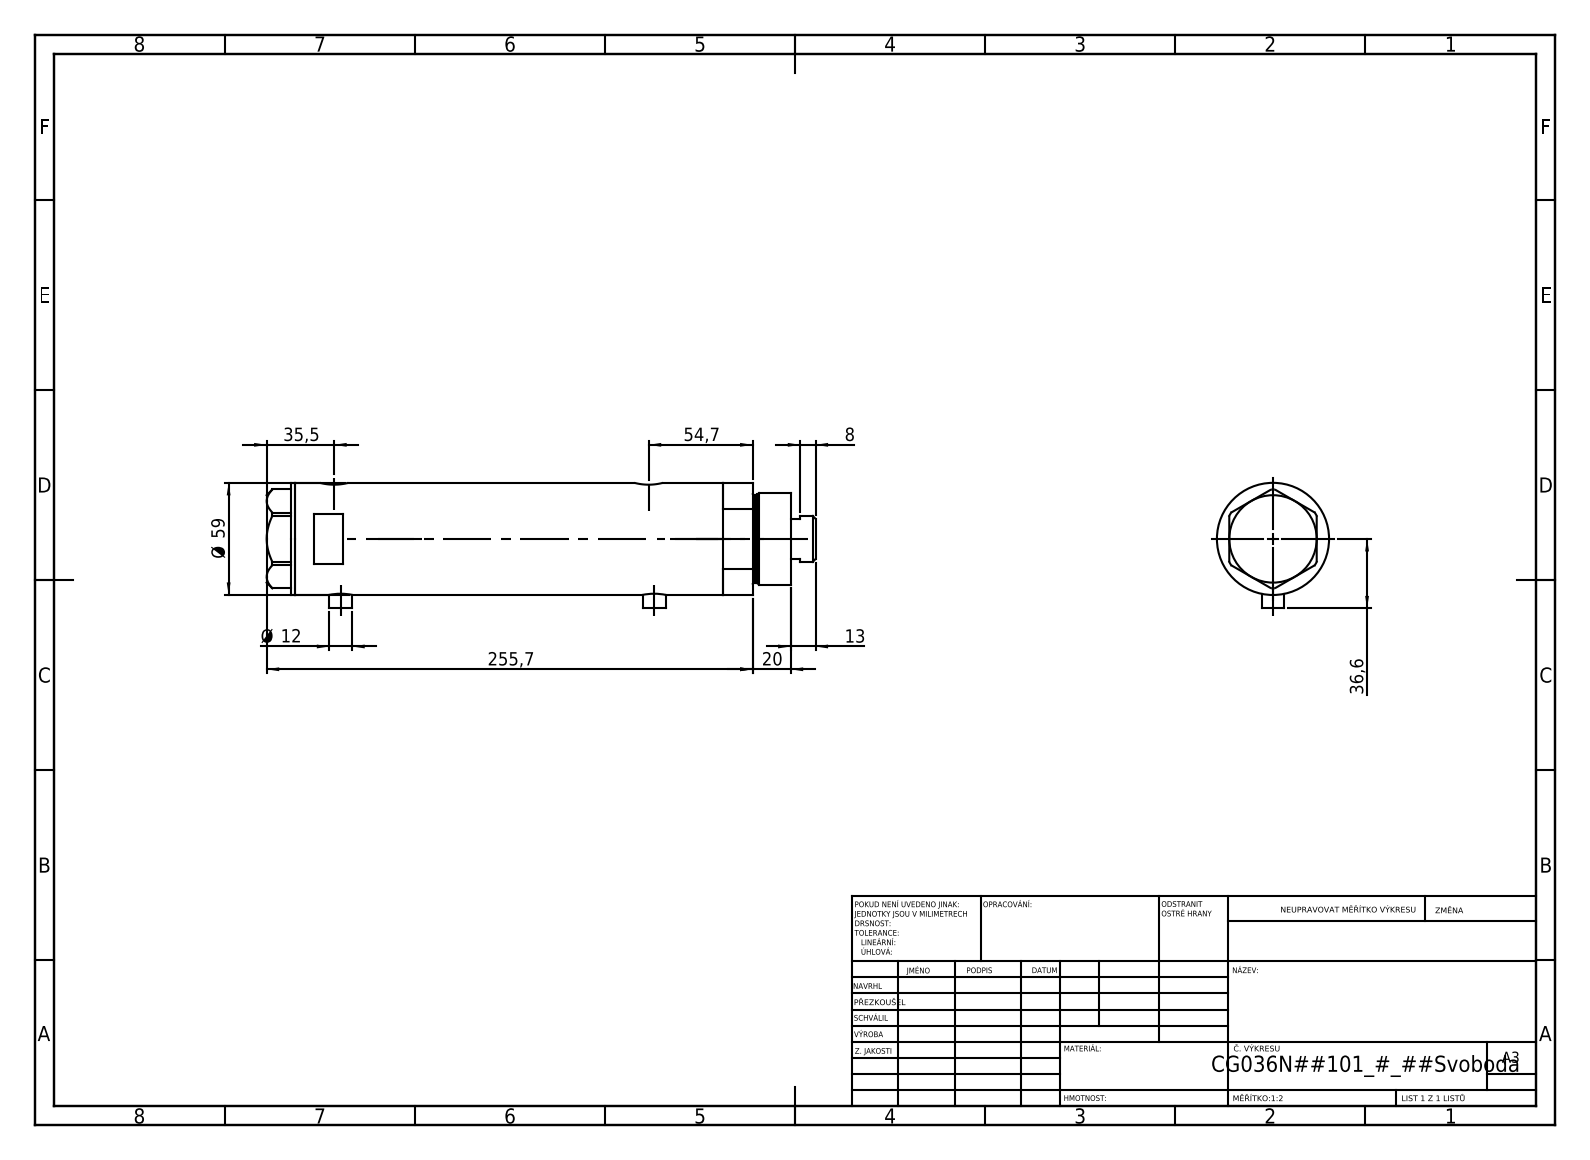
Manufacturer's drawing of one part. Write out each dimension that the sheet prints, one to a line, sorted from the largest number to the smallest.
255,7
Ø 59
54,7
36,6
35,5
20
13
Ø 12
8
